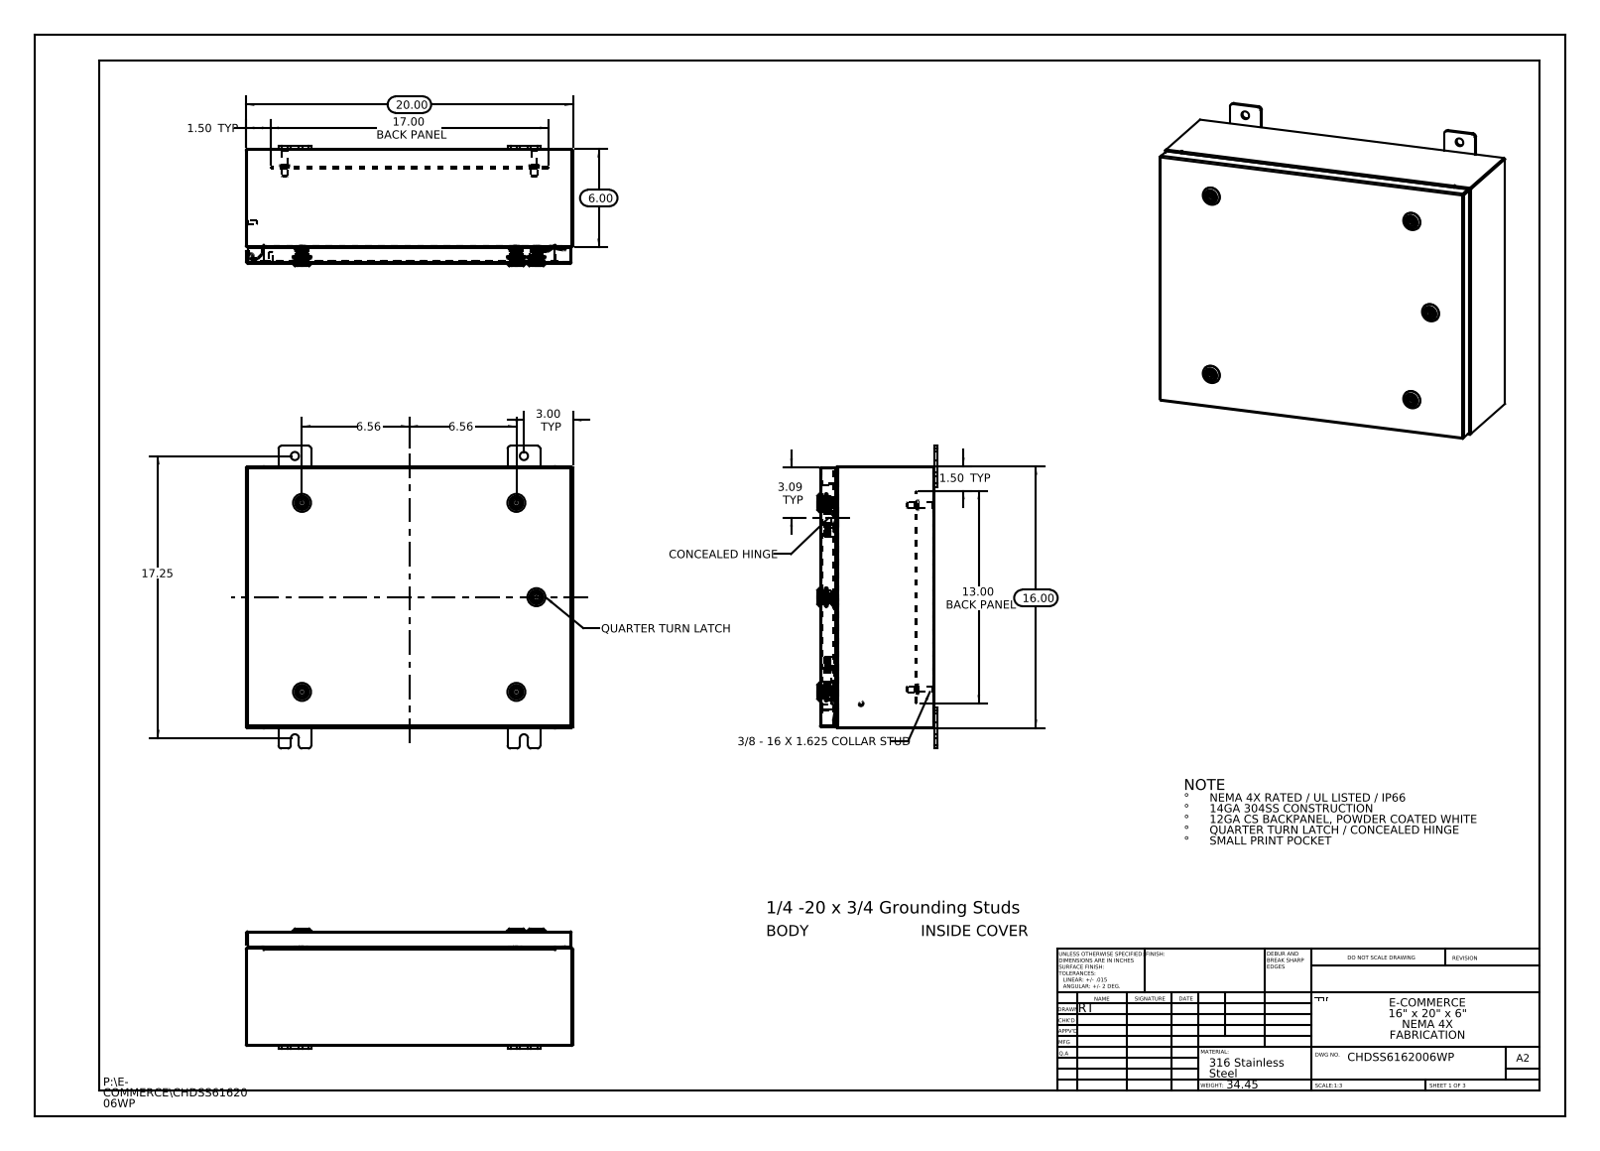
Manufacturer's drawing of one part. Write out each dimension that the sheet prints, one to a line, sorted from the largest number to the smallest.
20.00
17.25
17.00 BACK PANEL
16.00
13.00 BACK PANEL
6.56
6.56
6.00
3.09 TYP
3.00 TYP
1.50 TYP
1.50 TYP
